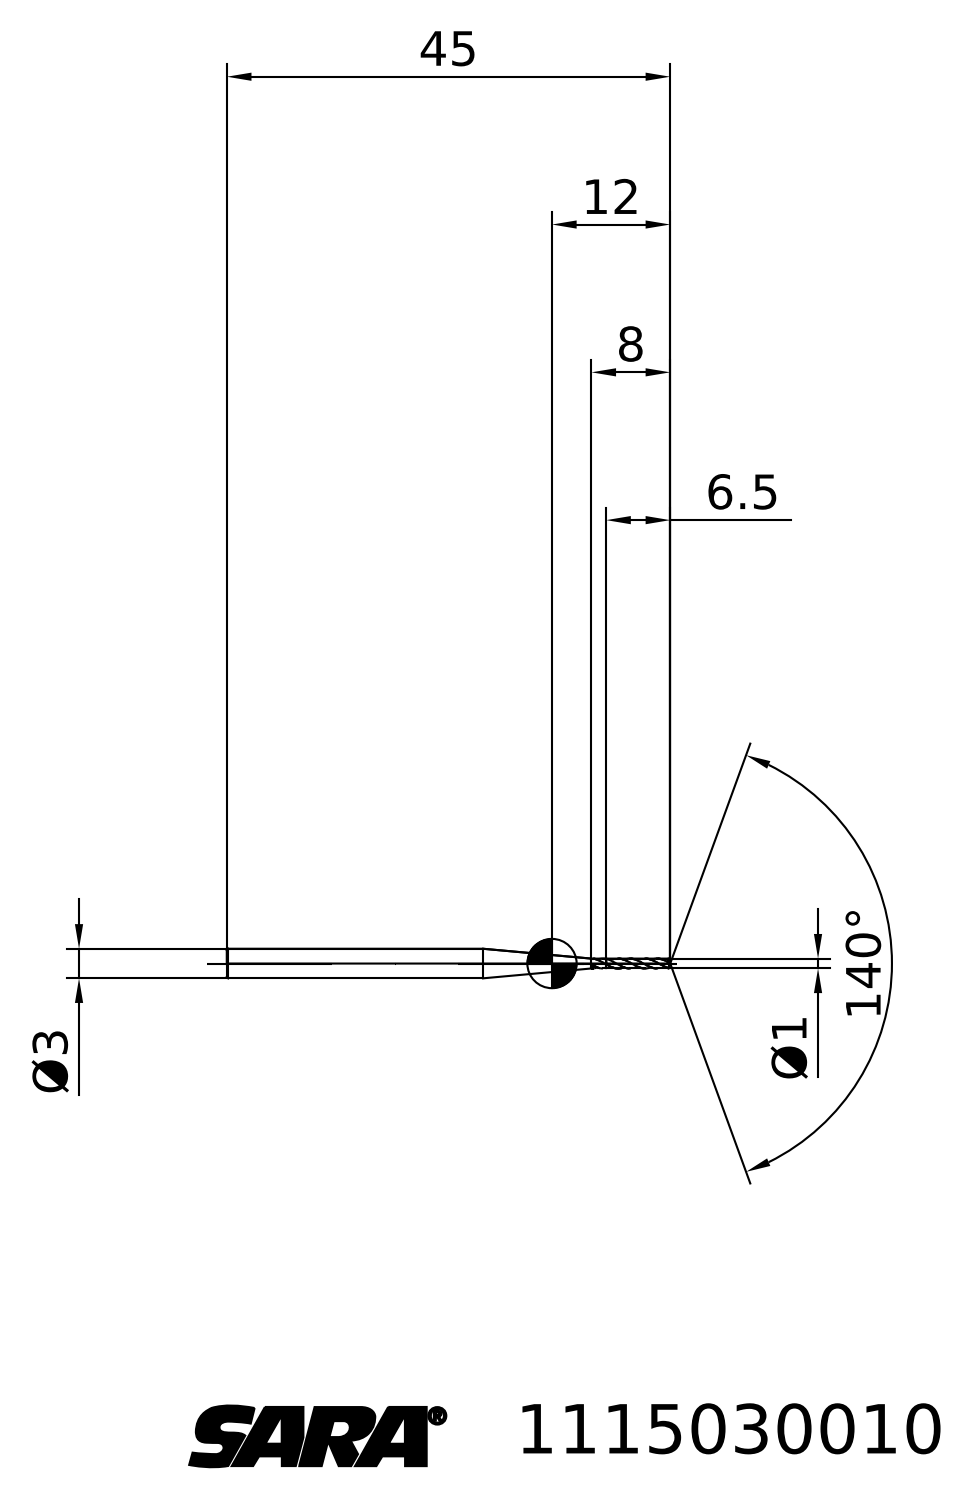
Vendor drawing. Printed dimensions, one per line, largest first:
140°
45
12
8
6.5
Ø3
Ø1
